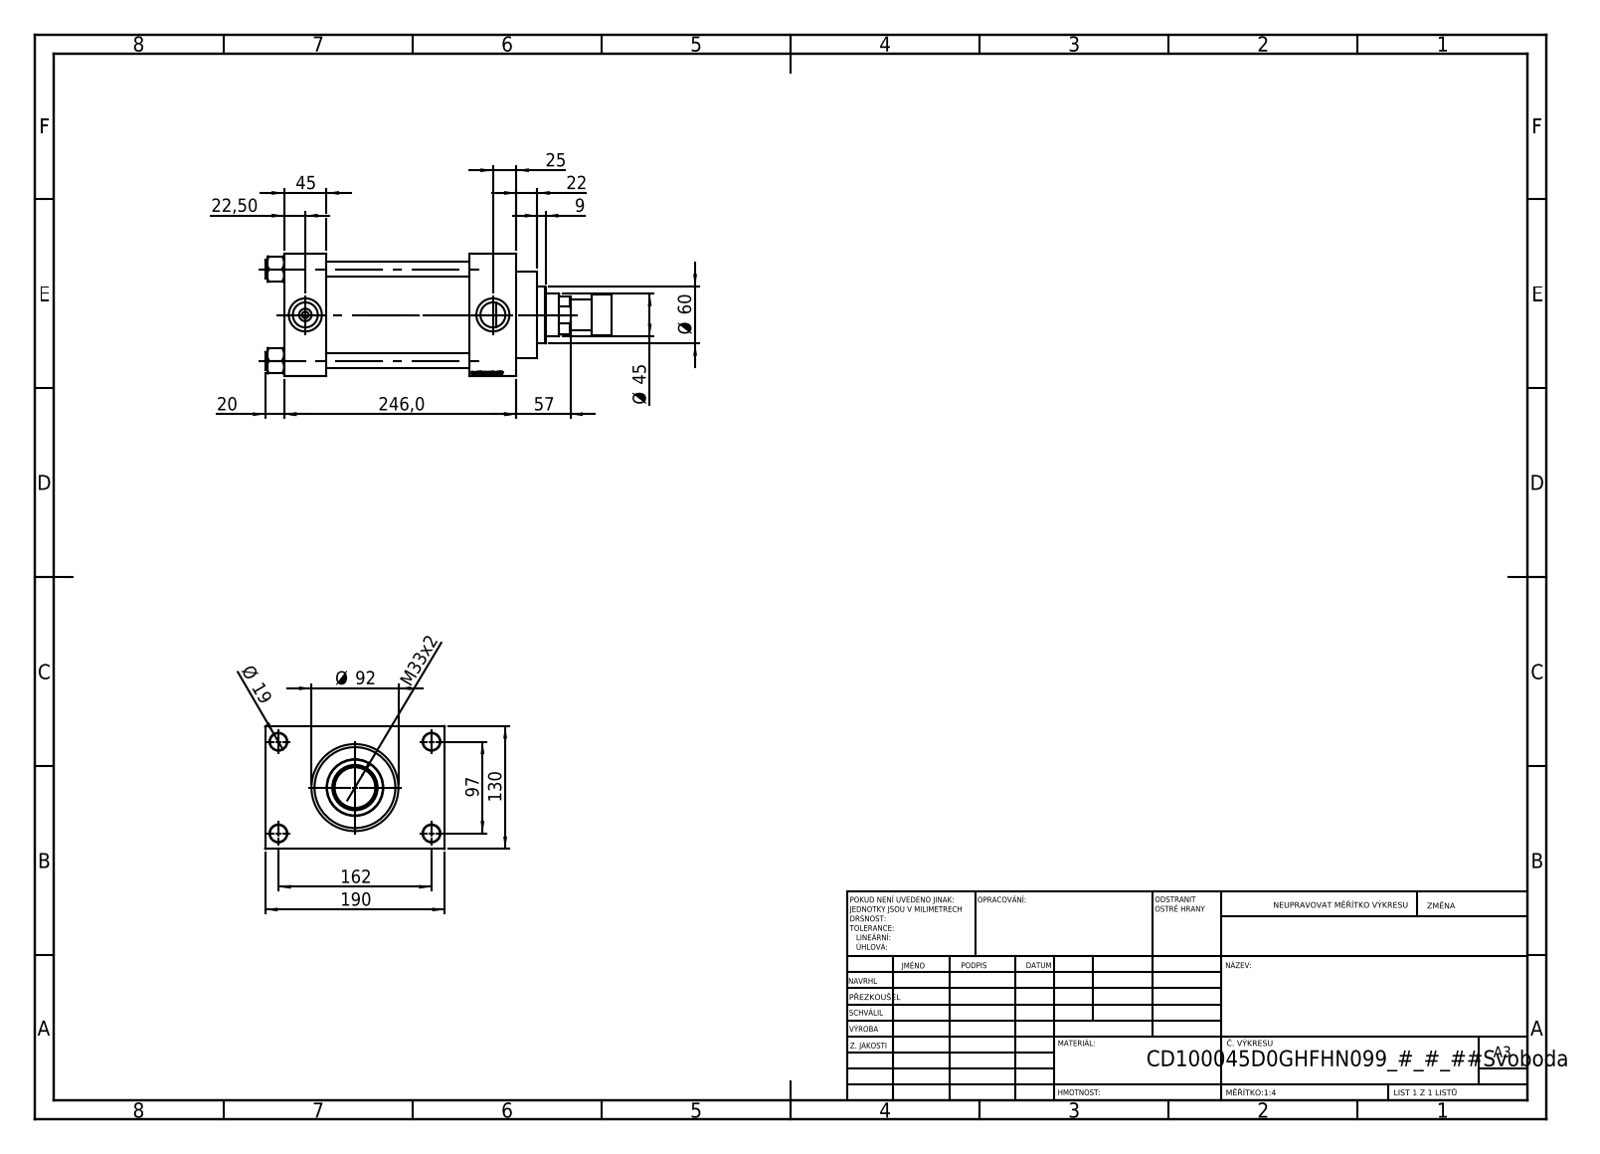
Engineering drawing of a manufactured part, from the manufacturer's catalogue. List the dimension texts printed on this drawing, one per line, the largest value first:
246,0
190
162
130
97
Ø 92
Ø 60
57
Ø 45
45
M33x2
25
22,50
22
20
Ø 19
9
